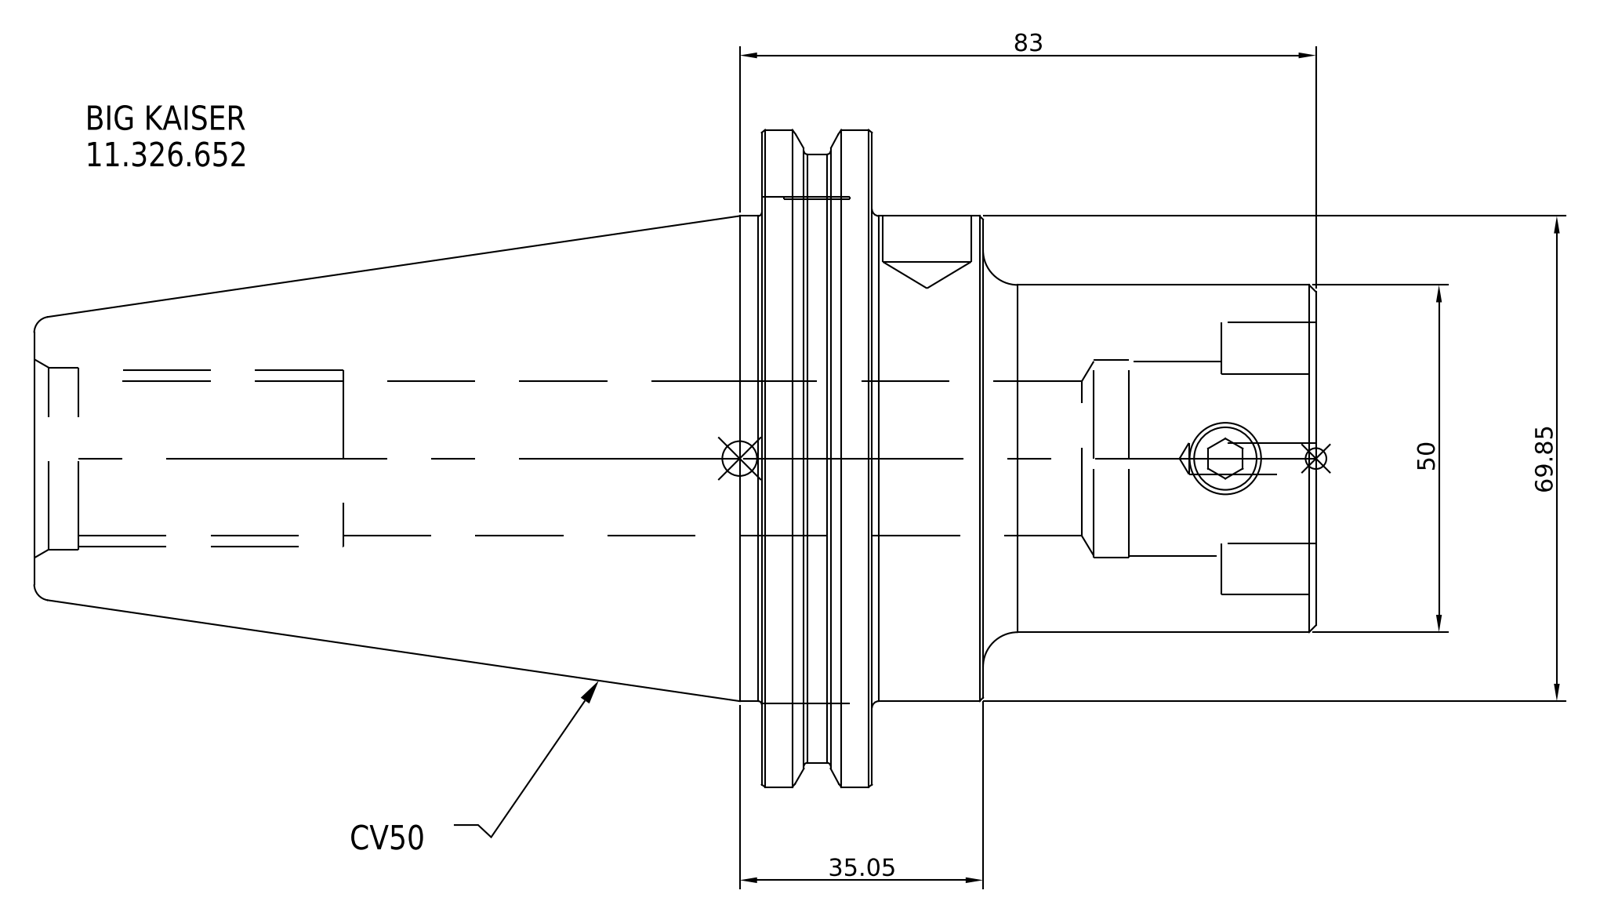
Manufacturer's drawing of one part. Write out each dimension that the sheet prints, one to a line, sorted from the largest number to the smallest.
83
69.85
50
35.05
